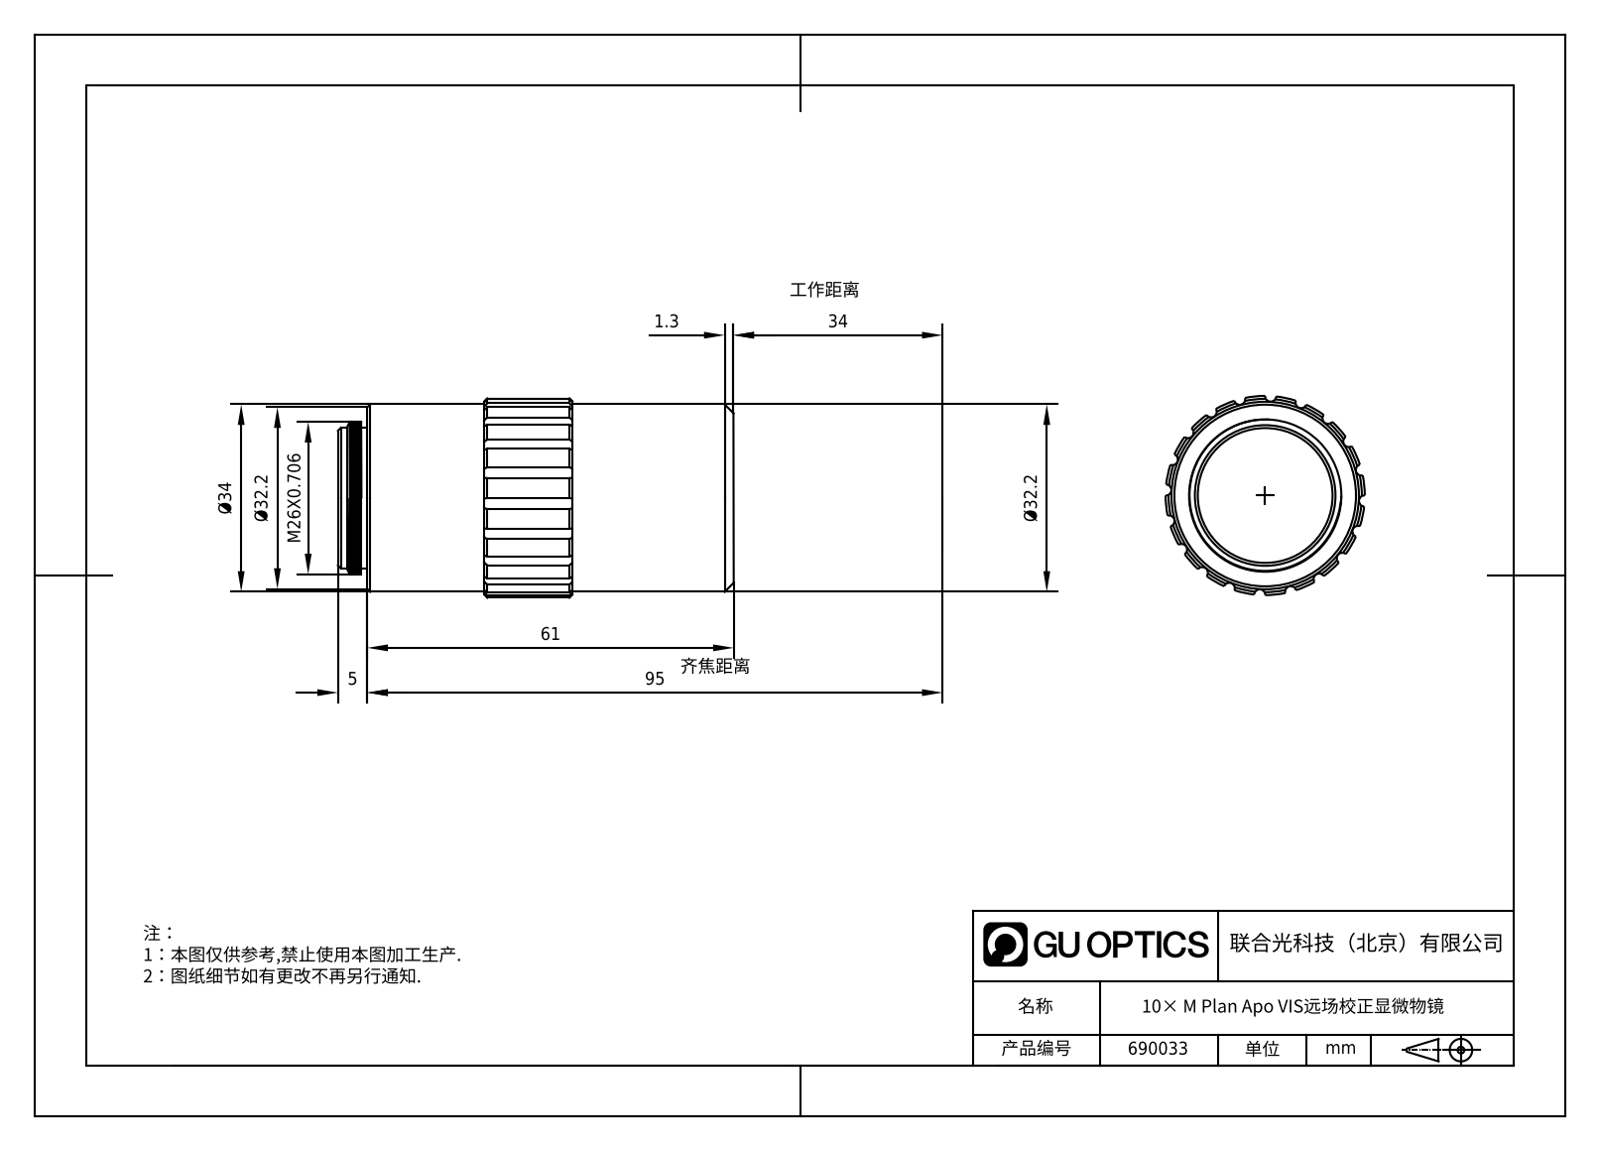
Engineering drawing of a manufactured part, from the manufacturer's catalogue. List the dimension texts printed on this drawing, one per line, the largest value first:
95
61
Ø34
34
Ø32.2
Ø32.2
M26X0.706
5
1.3
